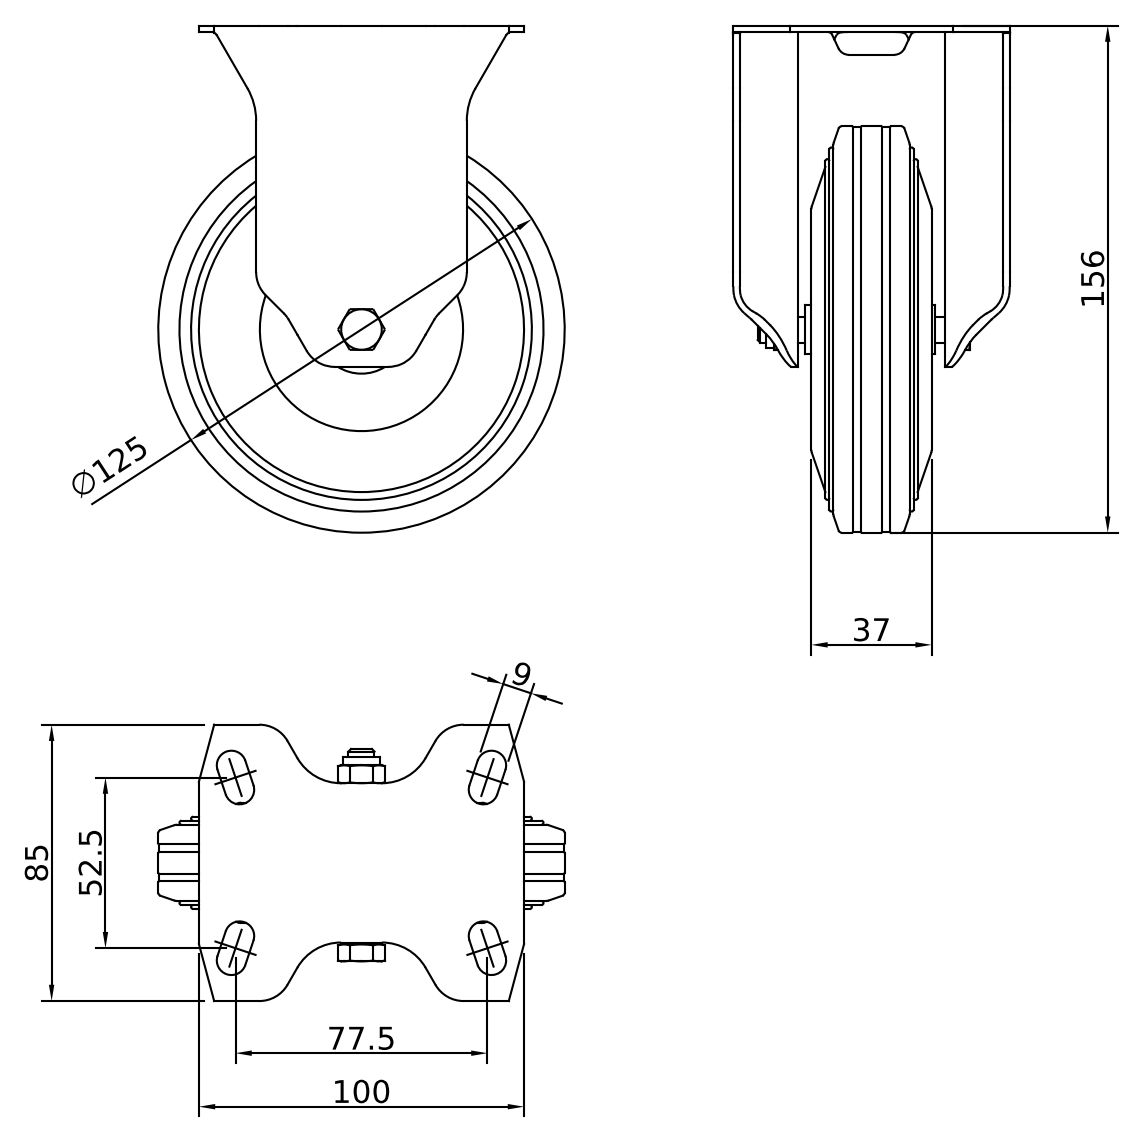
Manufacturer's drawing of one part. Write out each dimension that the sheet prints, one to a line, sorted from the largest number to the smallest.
156
∅125
100
85
77.5
52.5
37
9
